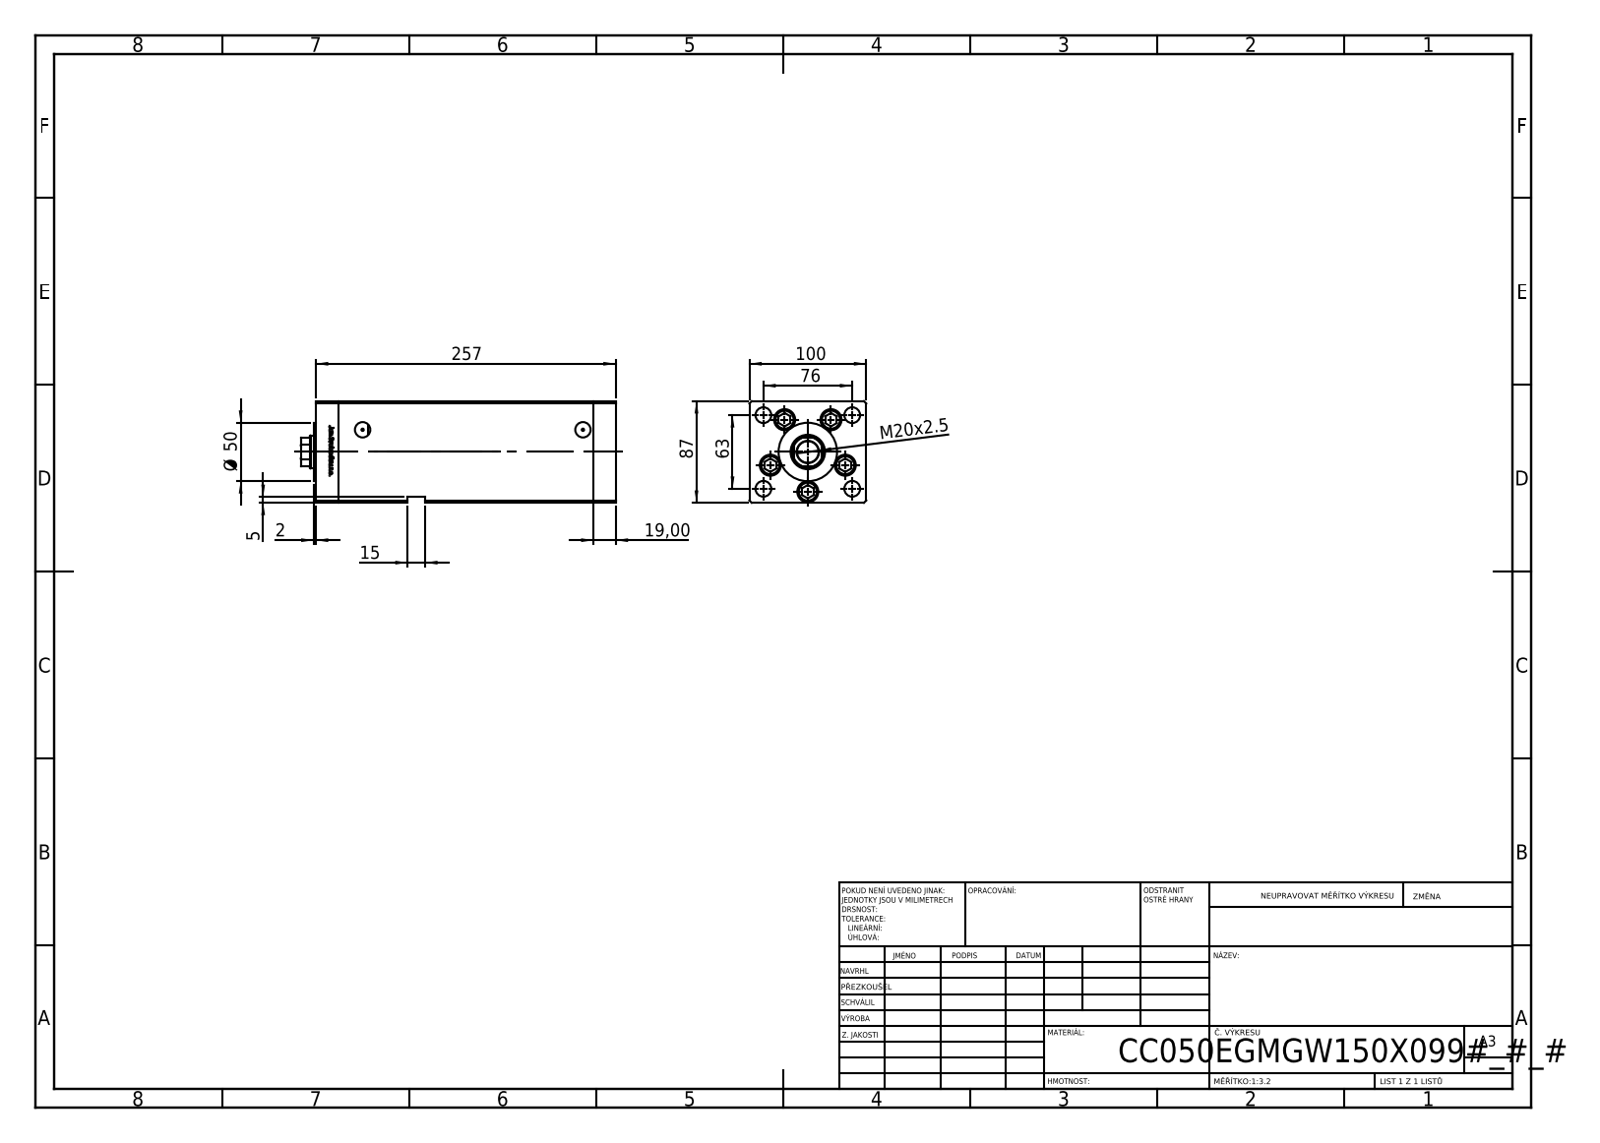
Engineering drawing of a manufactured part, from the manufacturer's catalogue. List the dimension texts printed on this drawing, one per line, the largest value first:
257
100
87
76
63
Ø 50
M20x2.5
19,00
15
5
2
